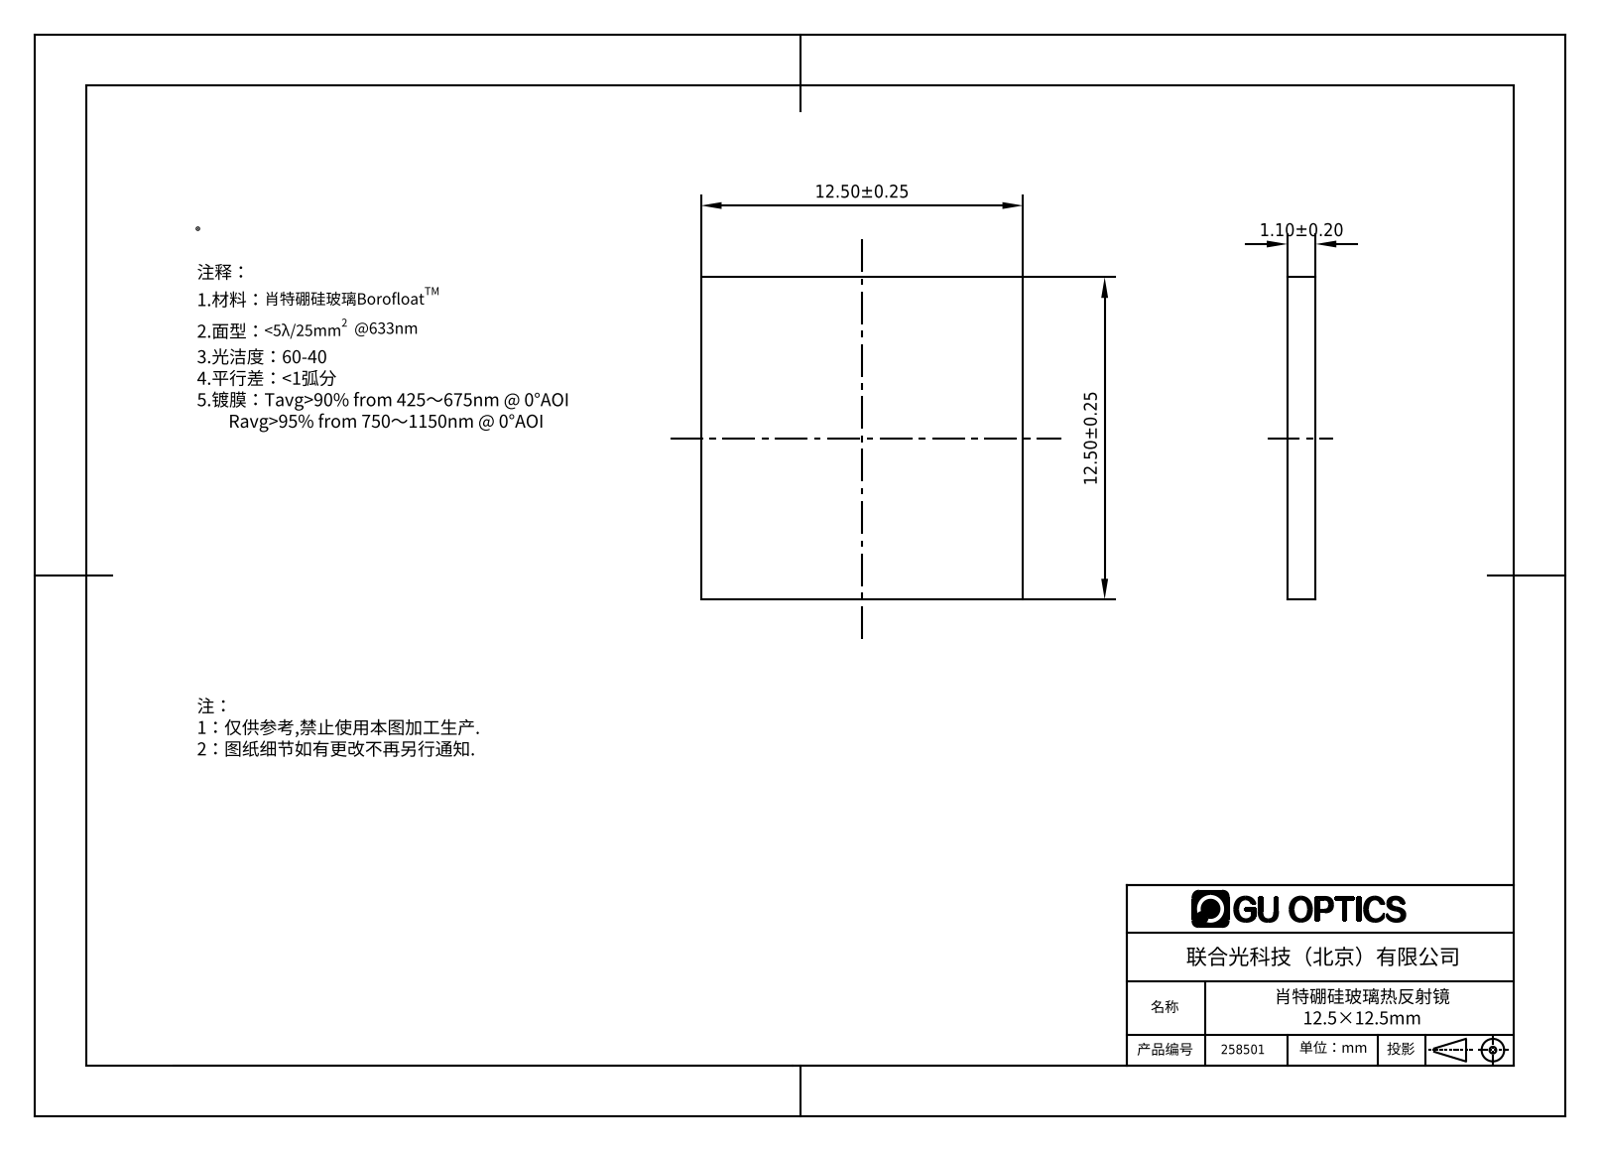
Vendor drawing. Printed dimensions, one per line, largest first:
12.50±0.25
12.50±0.25
1.10±0.20
